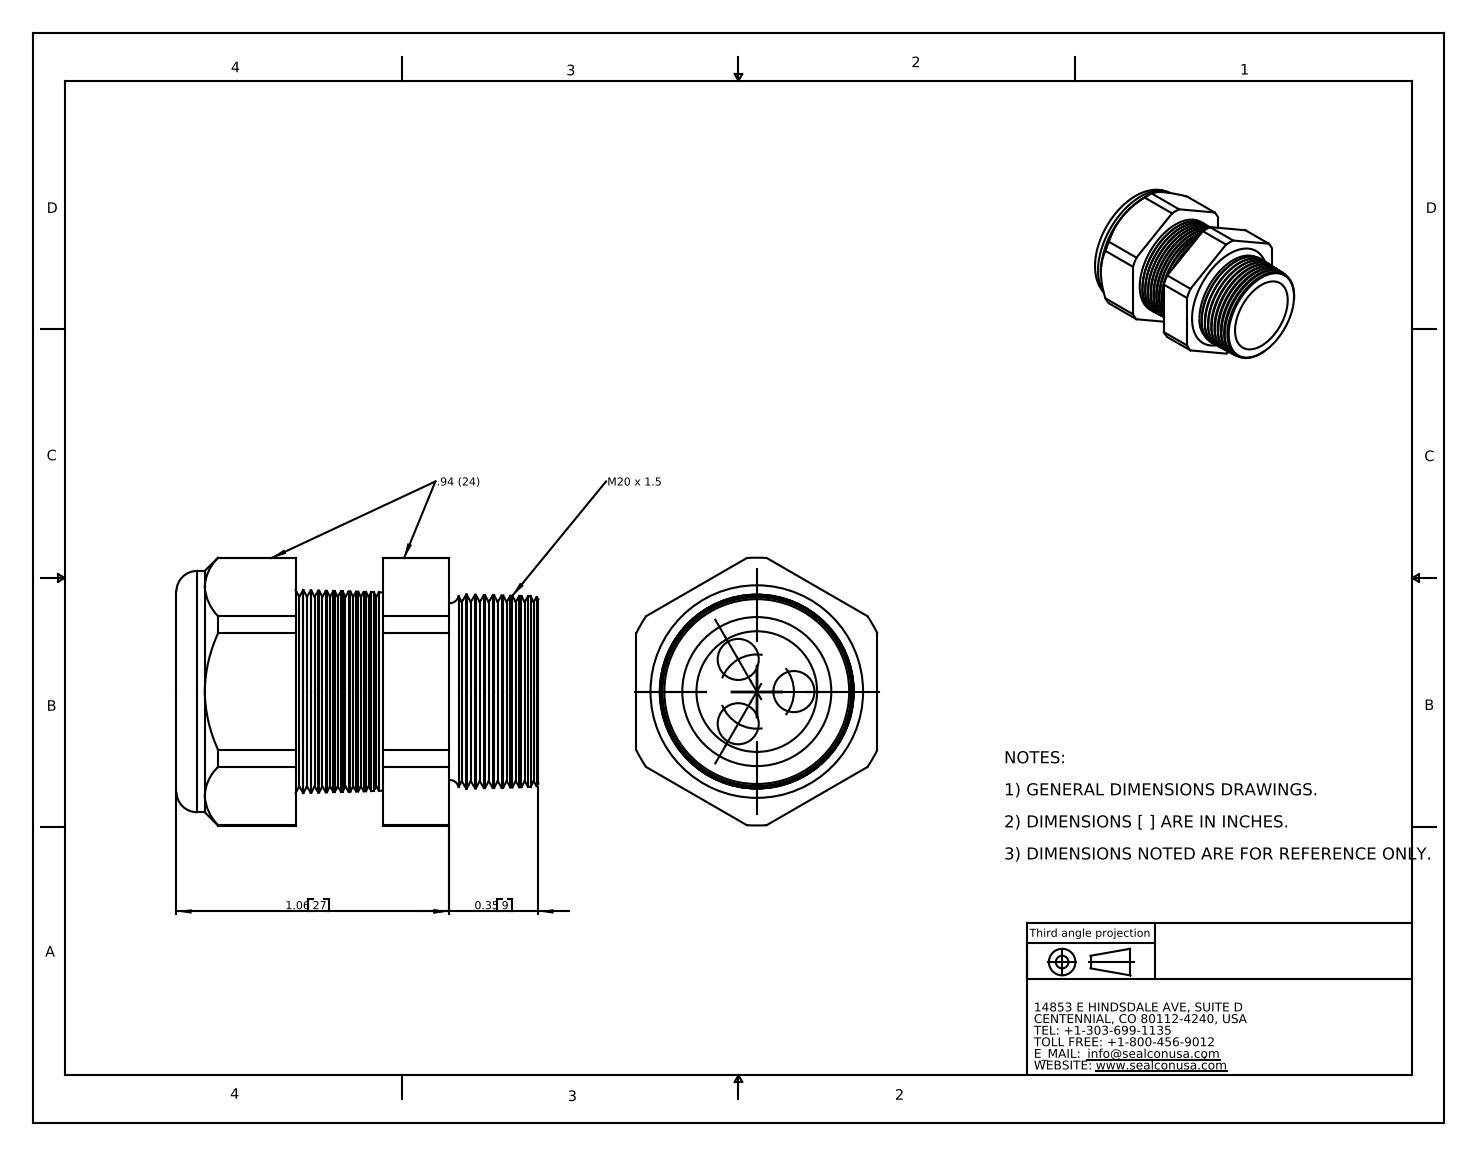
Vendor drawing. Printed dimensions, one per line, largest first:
1.06 27
0.35 9
